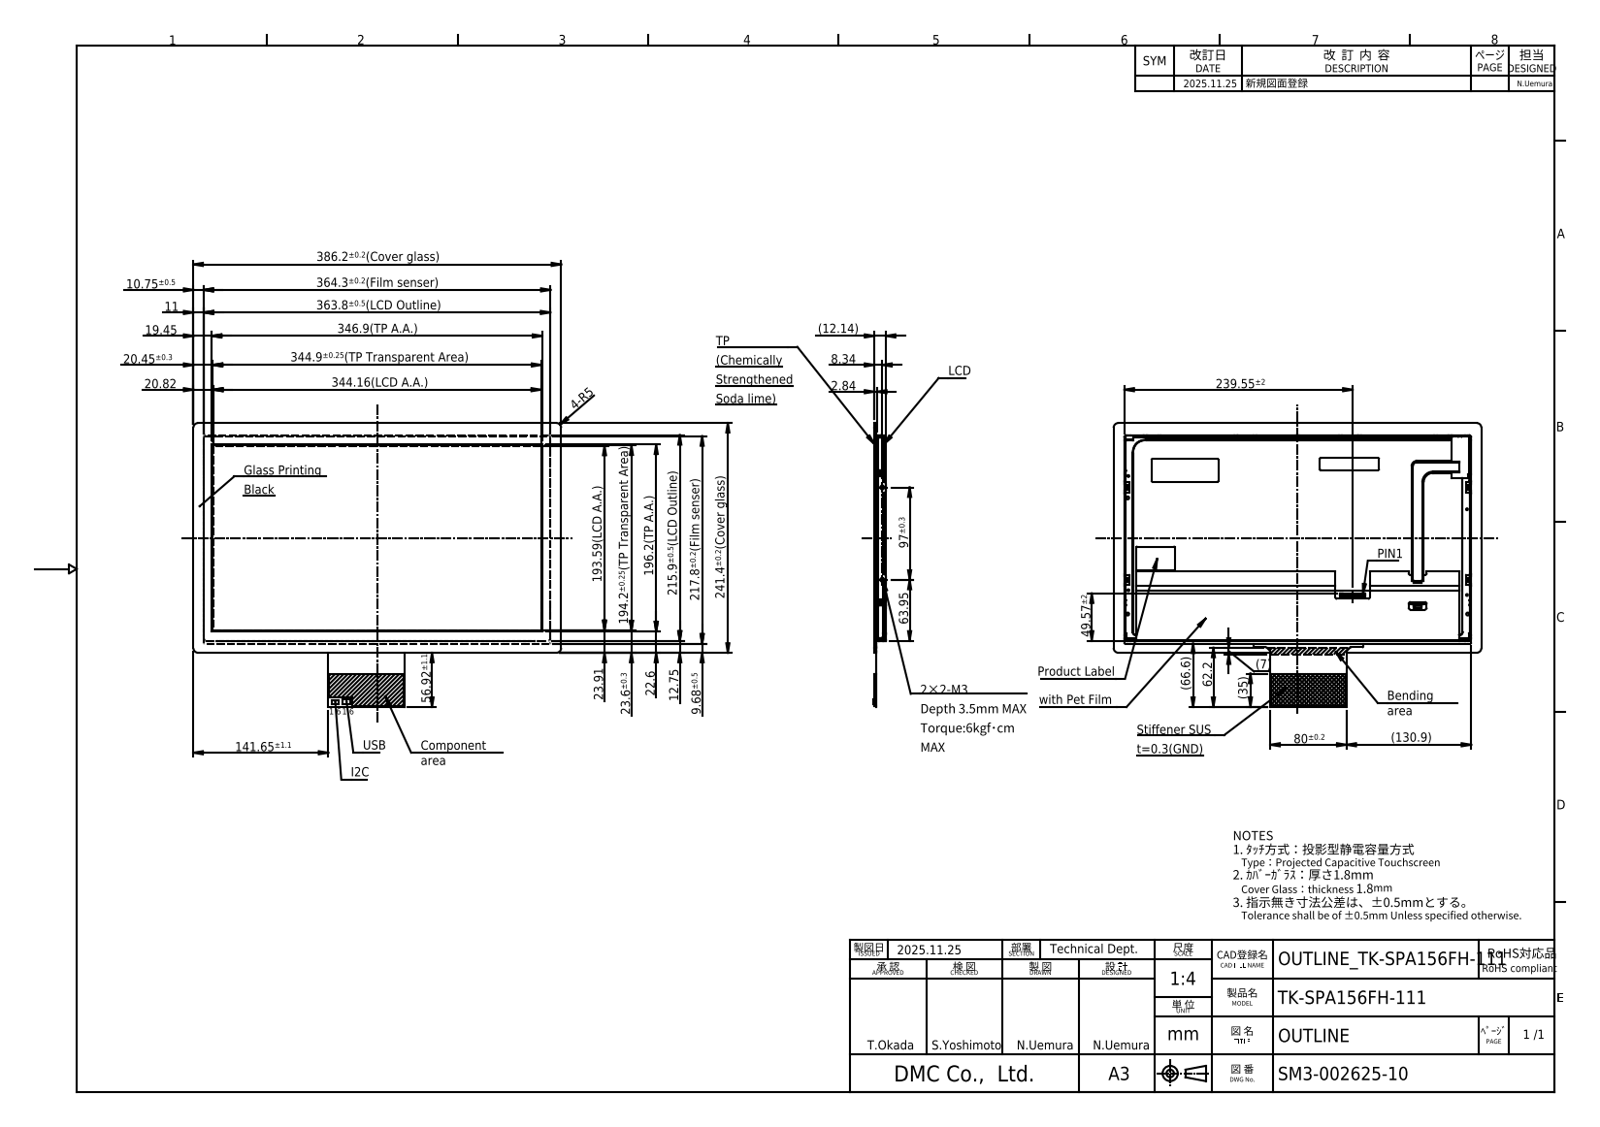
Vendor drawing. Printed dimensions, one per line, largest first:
386.2±0.2(Cover glass)
364.3±0.2(Film senser)
363.8±0.5(LCD Outline)
346.9(TP A.A.)
344.9±0.25(TP Transparent Area)
344.16(LCD A.A.)
241.4±0.2(Cover glass)
239.55±2
217.8±0.2(Film senser)
215.9±0.5(LCD Outline)
196.2(TP A.A.)
194.2±0.25(TP Transparent Area)
193.59(LCD A.A.)
141.65±1.1
(130.9)
97±0.3
80±0.2
(66.6)
63.95
62.2
56.92±1.1
49.57±2
(35)
23.91
23.6±0.3
22.6
20.82
20.45±0.3
19.45
12.75
(12.14)
11
10.75±0.5
9.68±0.5
8.34
(7)
4-R5
2.84
